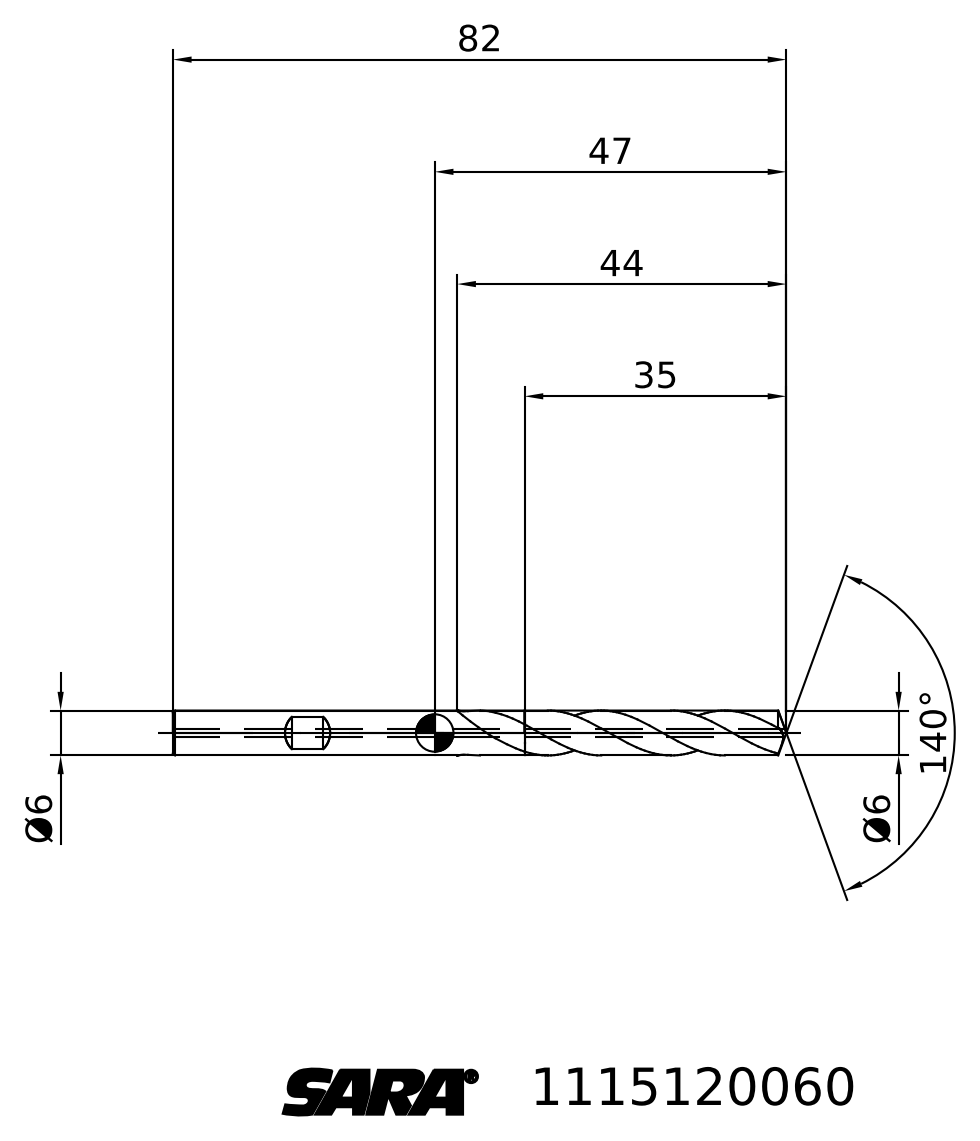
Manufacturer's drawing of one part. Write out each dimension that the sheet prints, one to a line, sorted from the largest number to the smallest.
140°
82
47
44
35
Ø6
Ø6
